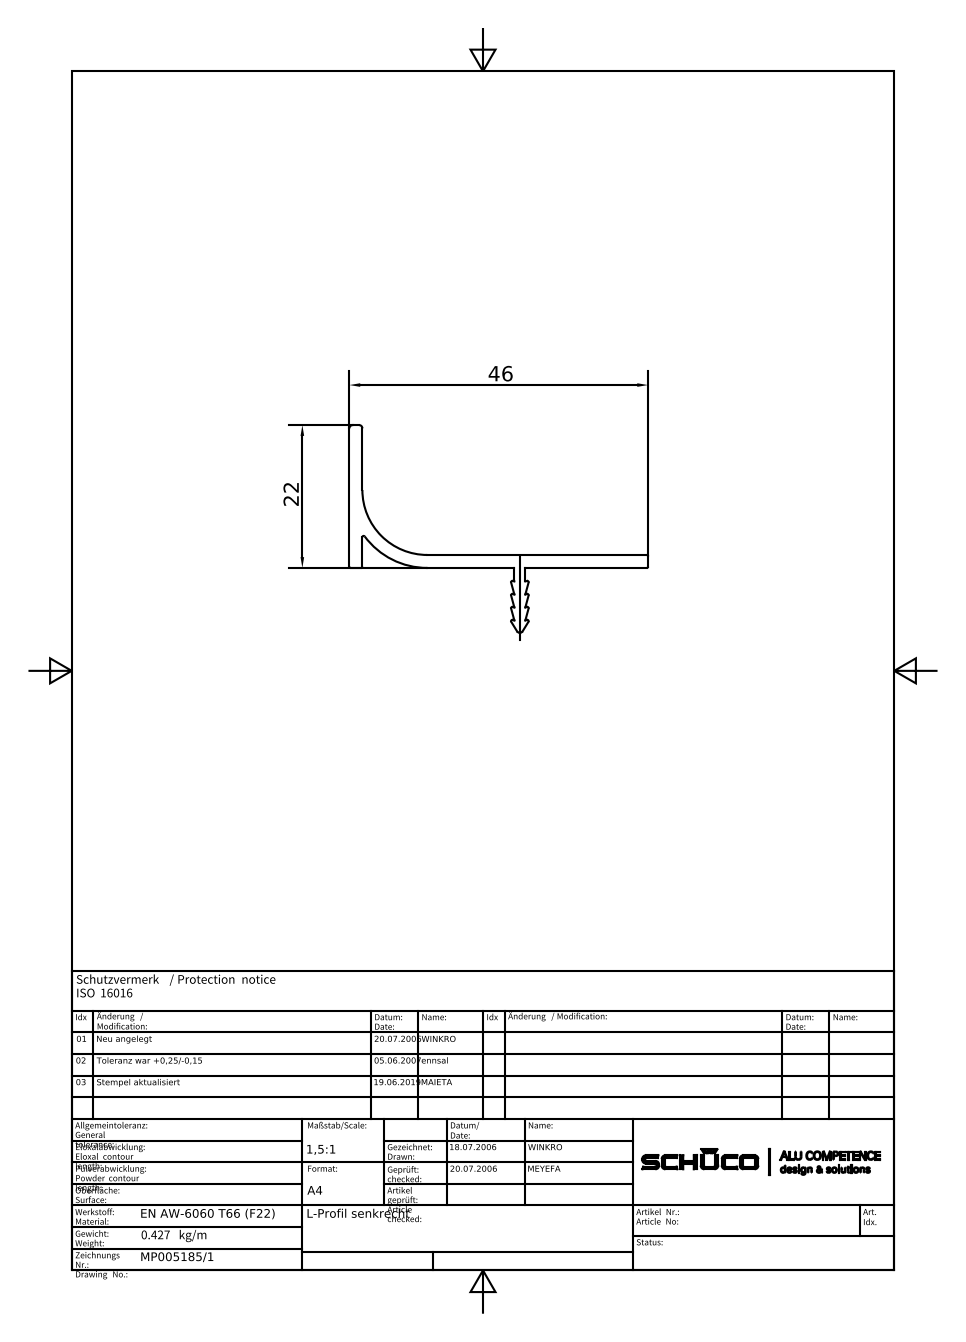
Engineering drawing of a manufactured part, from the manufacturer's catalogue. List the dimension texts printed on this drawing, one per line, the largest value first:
46
22
